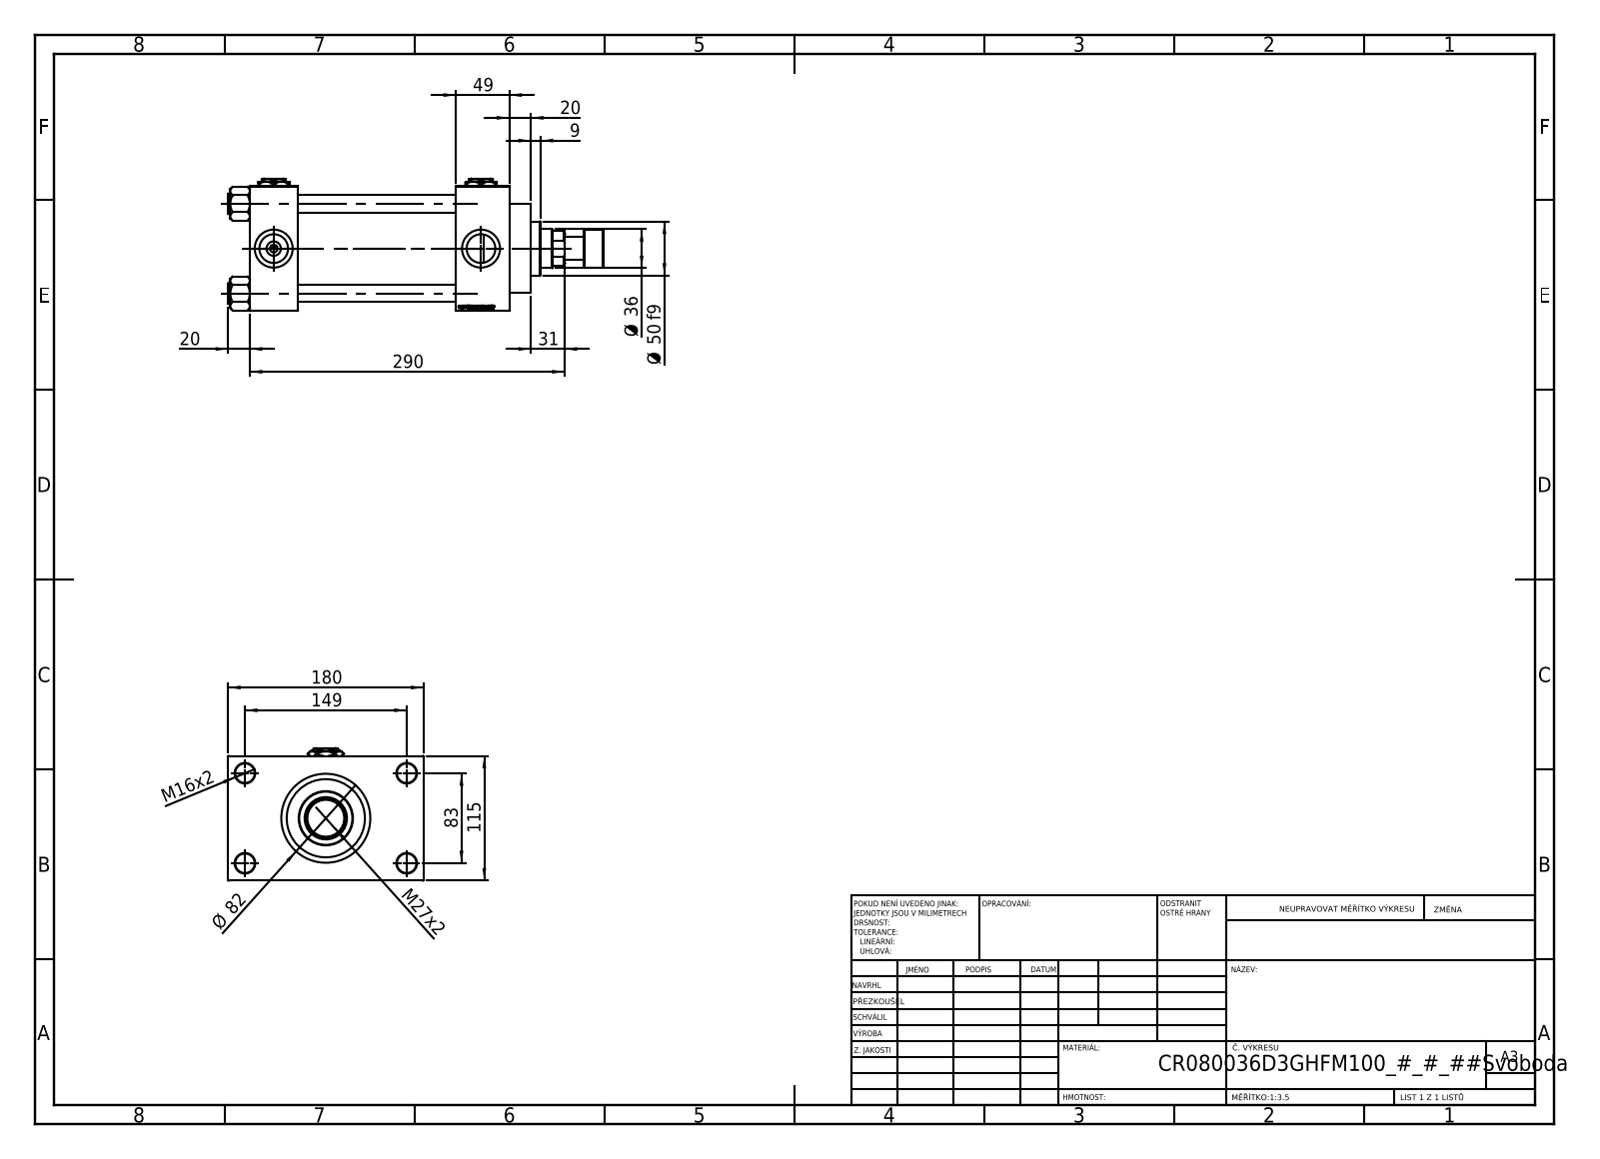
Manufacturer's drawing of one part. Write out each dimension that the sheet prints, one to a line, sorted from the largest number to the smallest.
290
180
149
115
83
Ø 82
Ø 50 f9
49
Ø 36
31
M27x2
20
20
M16x2
9
